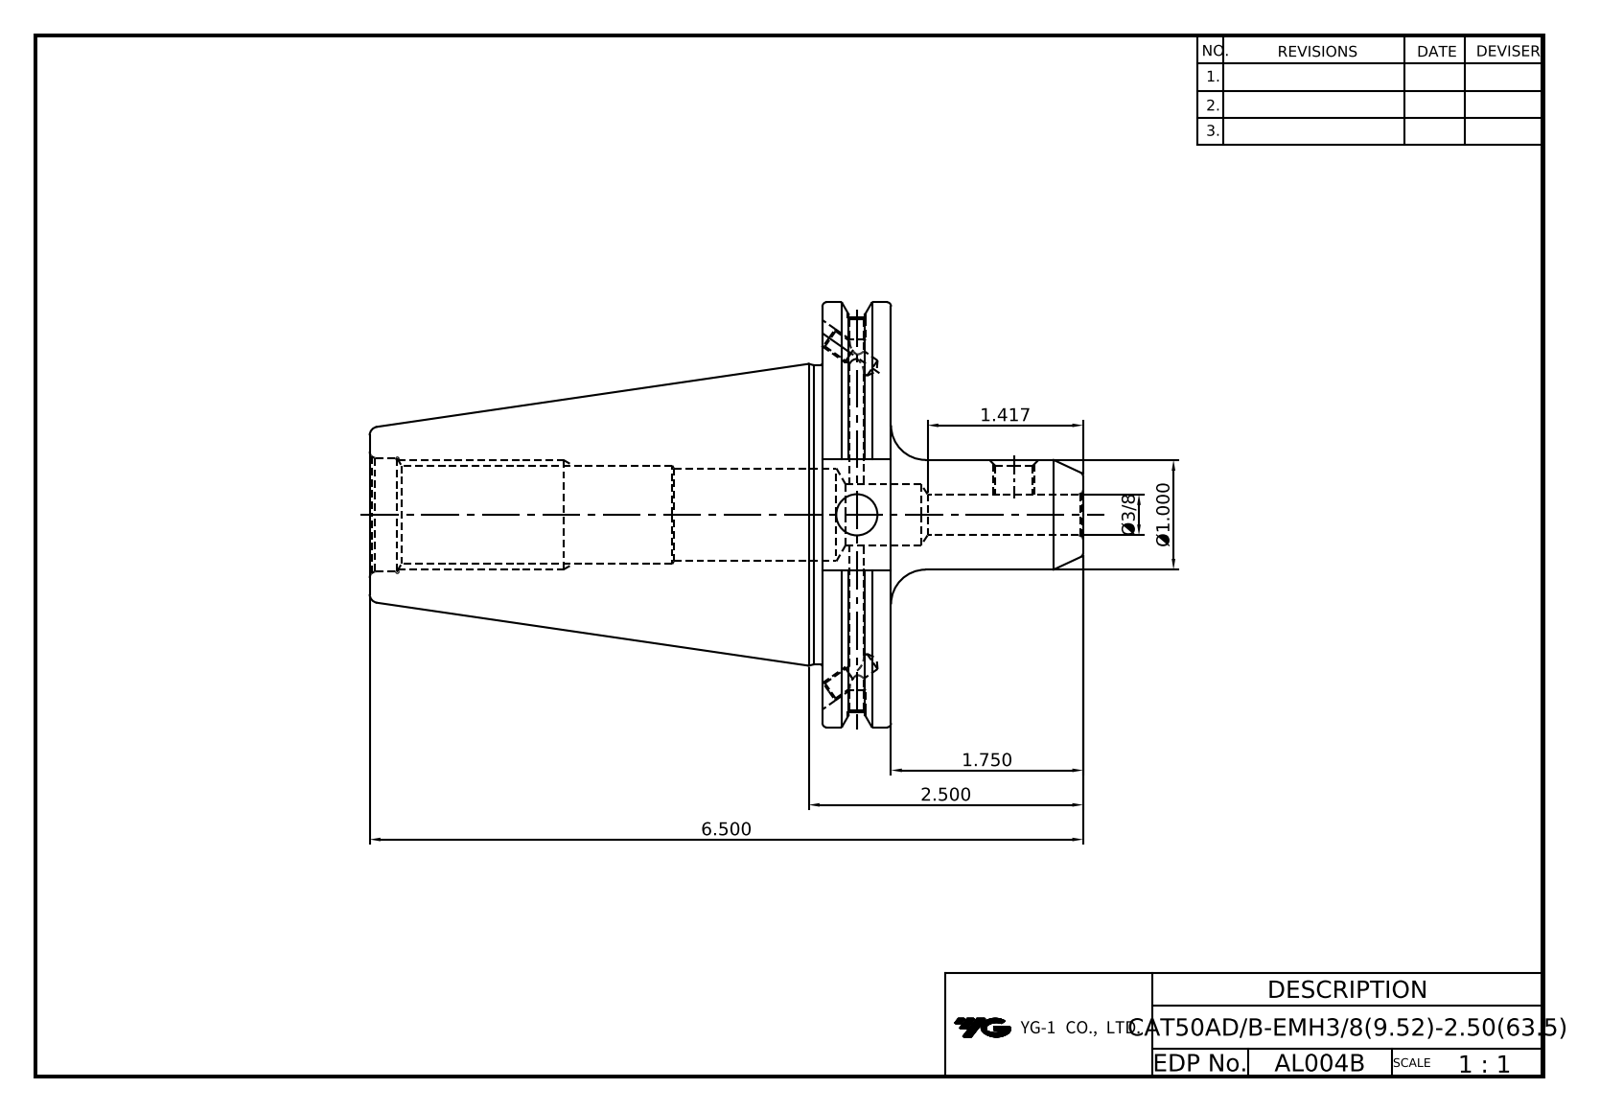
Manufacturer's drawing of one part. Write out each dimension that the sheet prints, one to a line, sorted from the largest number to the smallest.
6.500
2.500
1.750
1.417
Ø1.000
Ø3/8
